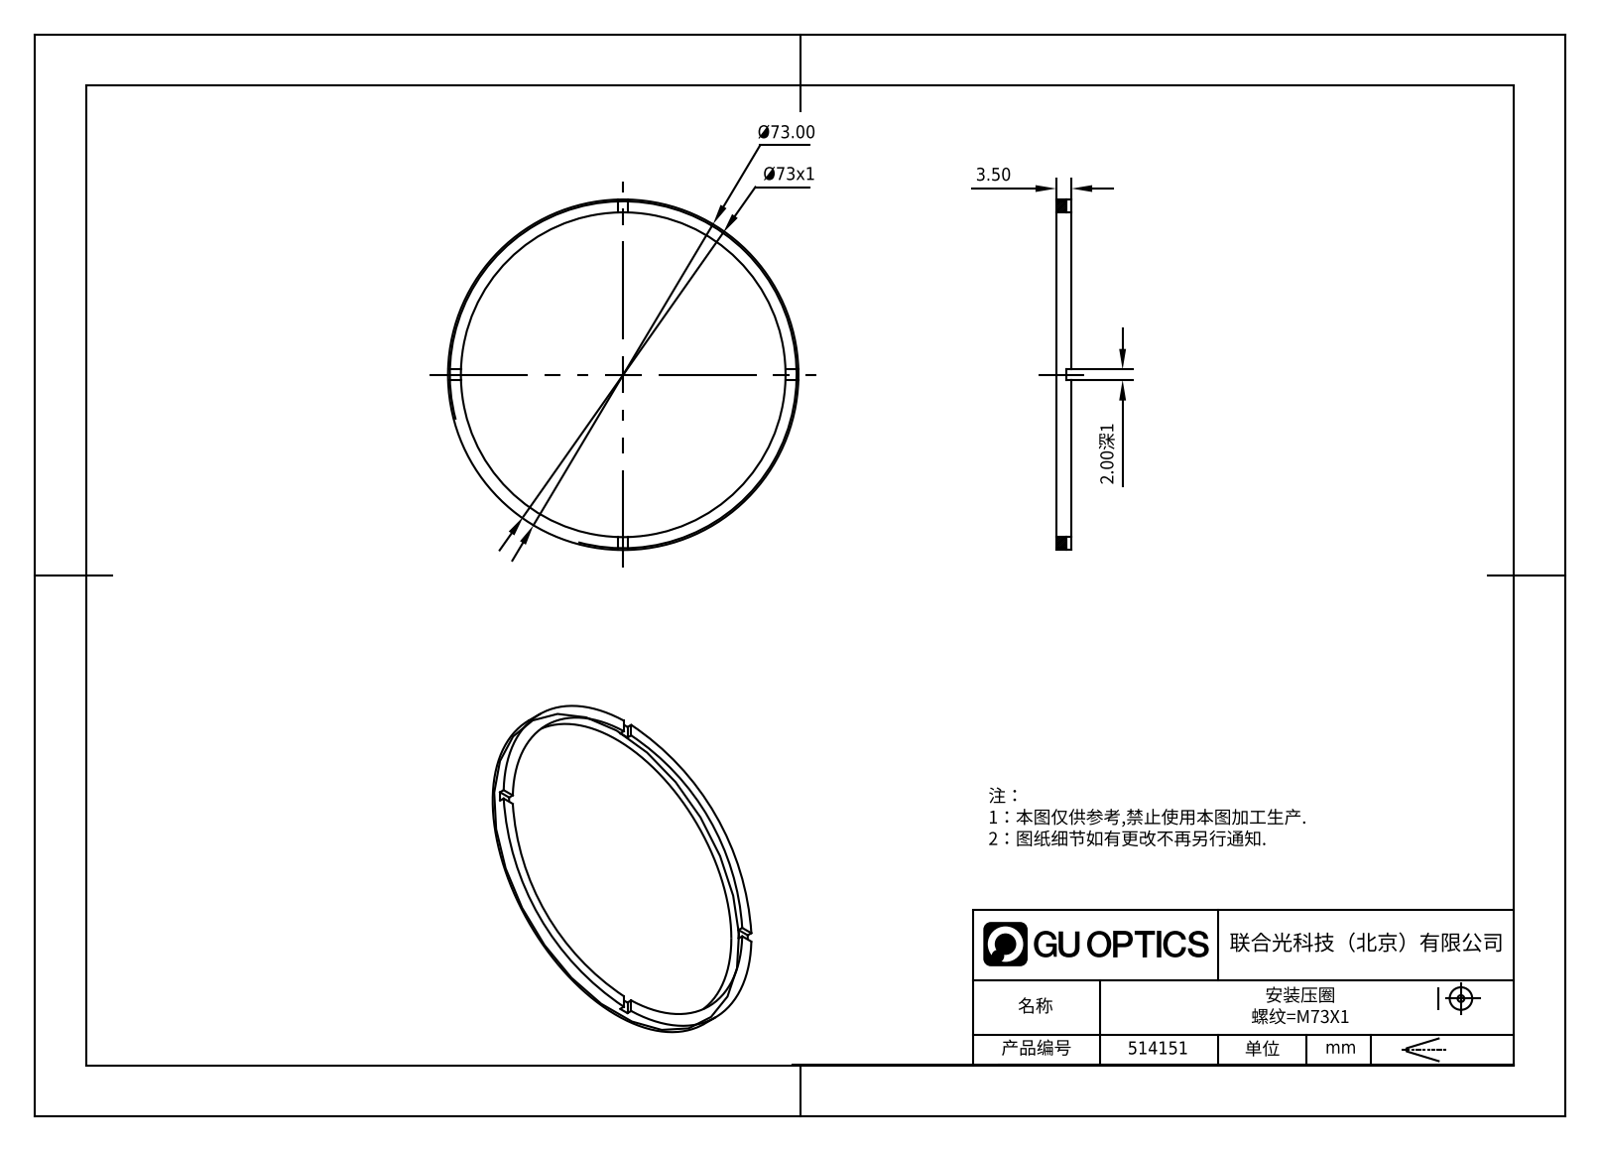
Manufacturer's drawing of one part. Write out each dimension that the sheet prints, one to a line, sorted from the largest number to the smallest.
Ø73.00
Ø73x1
3.50
2.00深1
